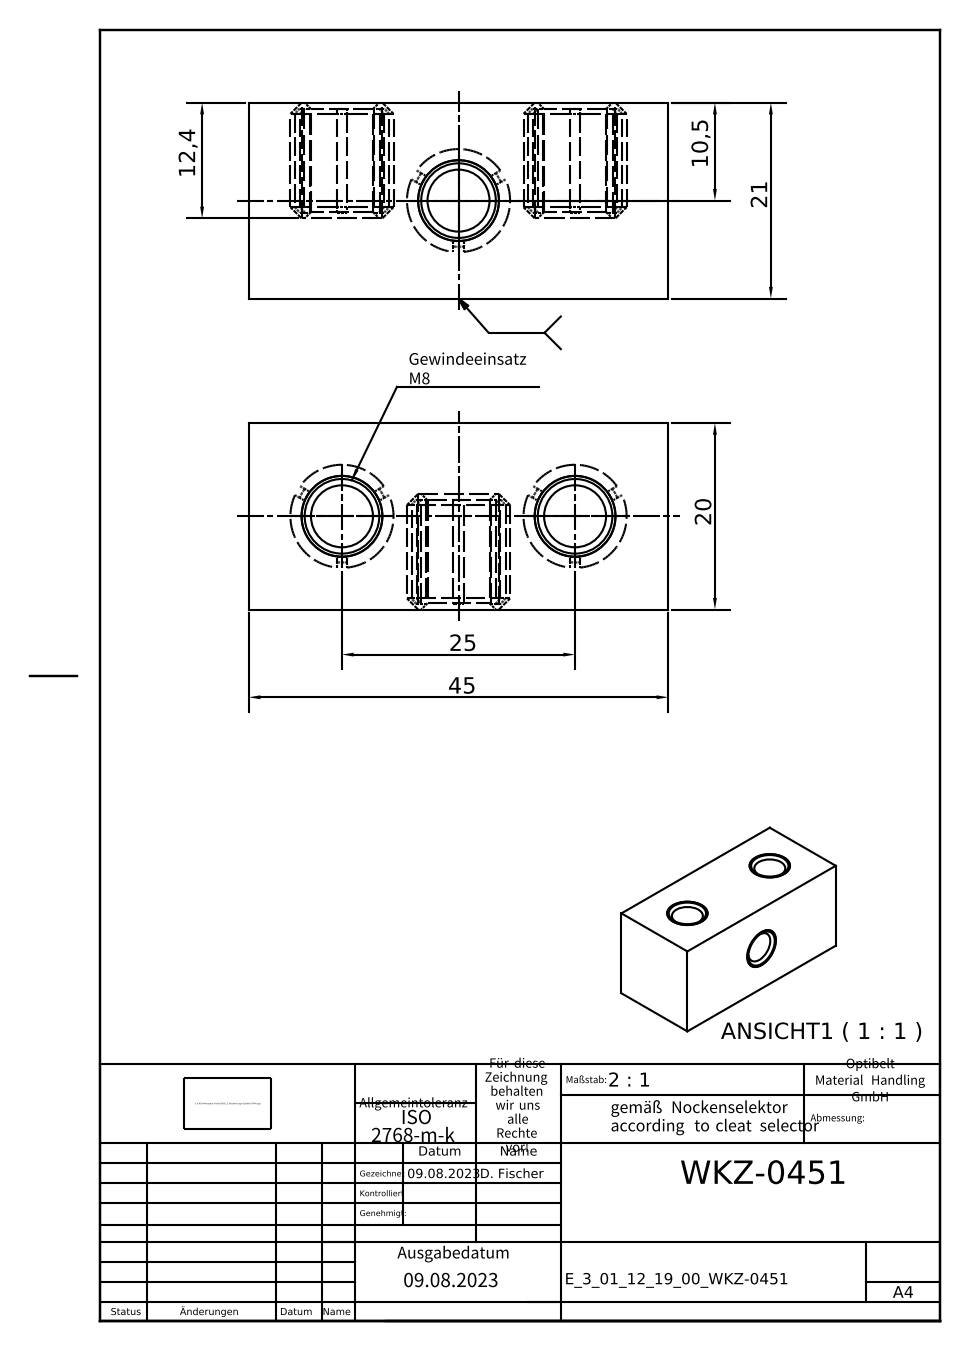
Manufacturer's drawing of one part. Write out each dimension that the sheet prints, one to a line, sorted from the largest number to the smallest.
45
25
21
20
12,4
10,5
